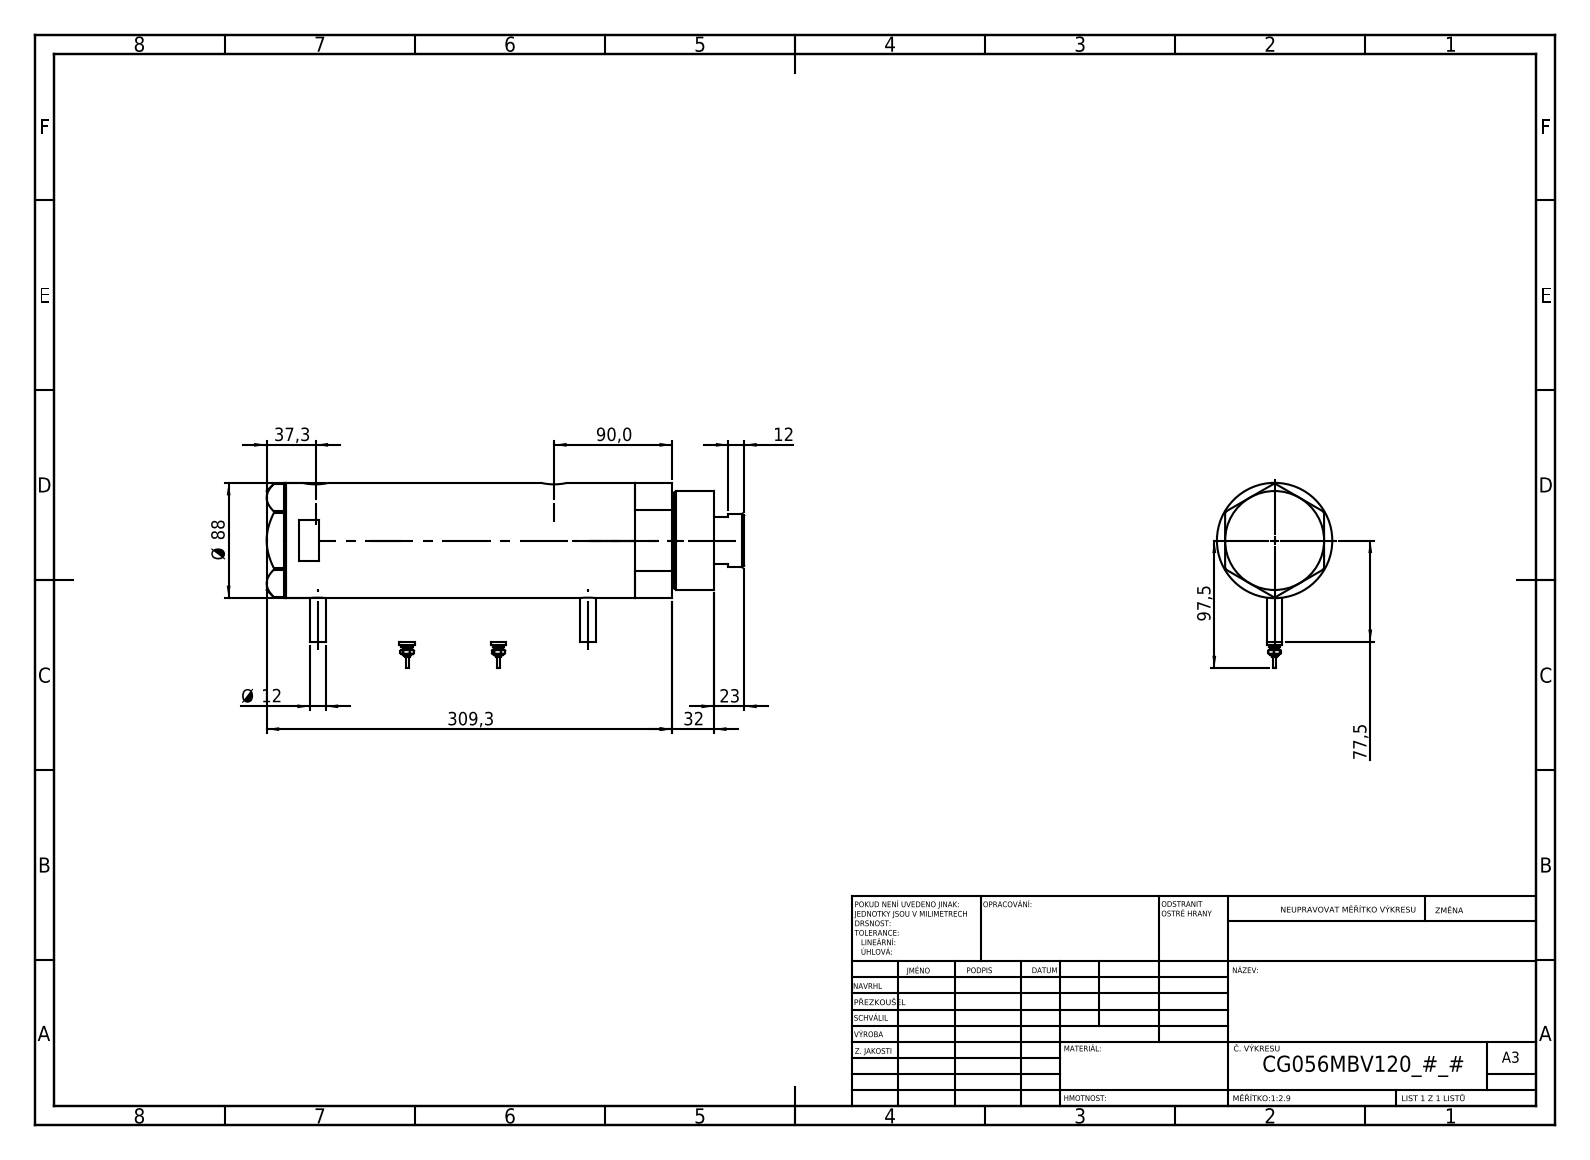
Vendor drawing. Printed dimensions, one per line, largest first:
309,3
97,5
90,0
Ø 88
77,5
37,3
32
23
12
Ø 12
